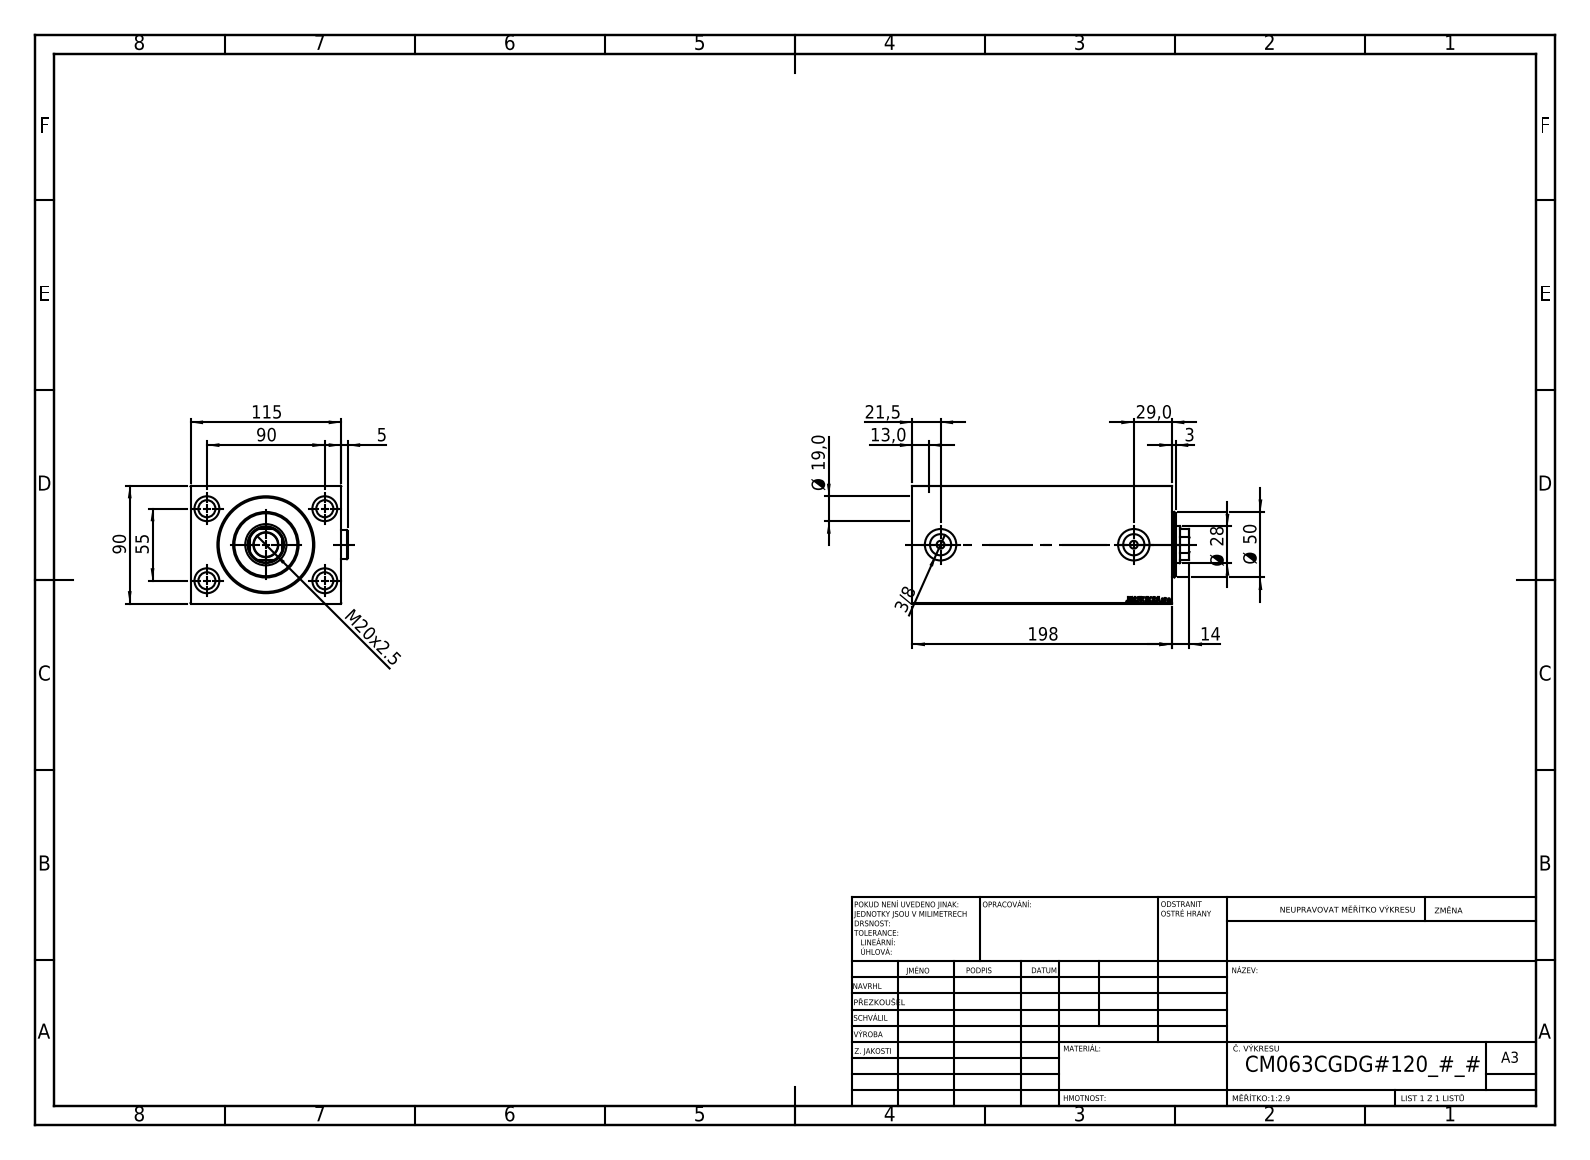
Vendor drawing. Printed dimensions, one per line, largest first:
198
115
90
90
55
Ø 50
29,0
Ø 28
21,5
M20x2.5
Ø 19,0
14
13,0
5
3
3/8
